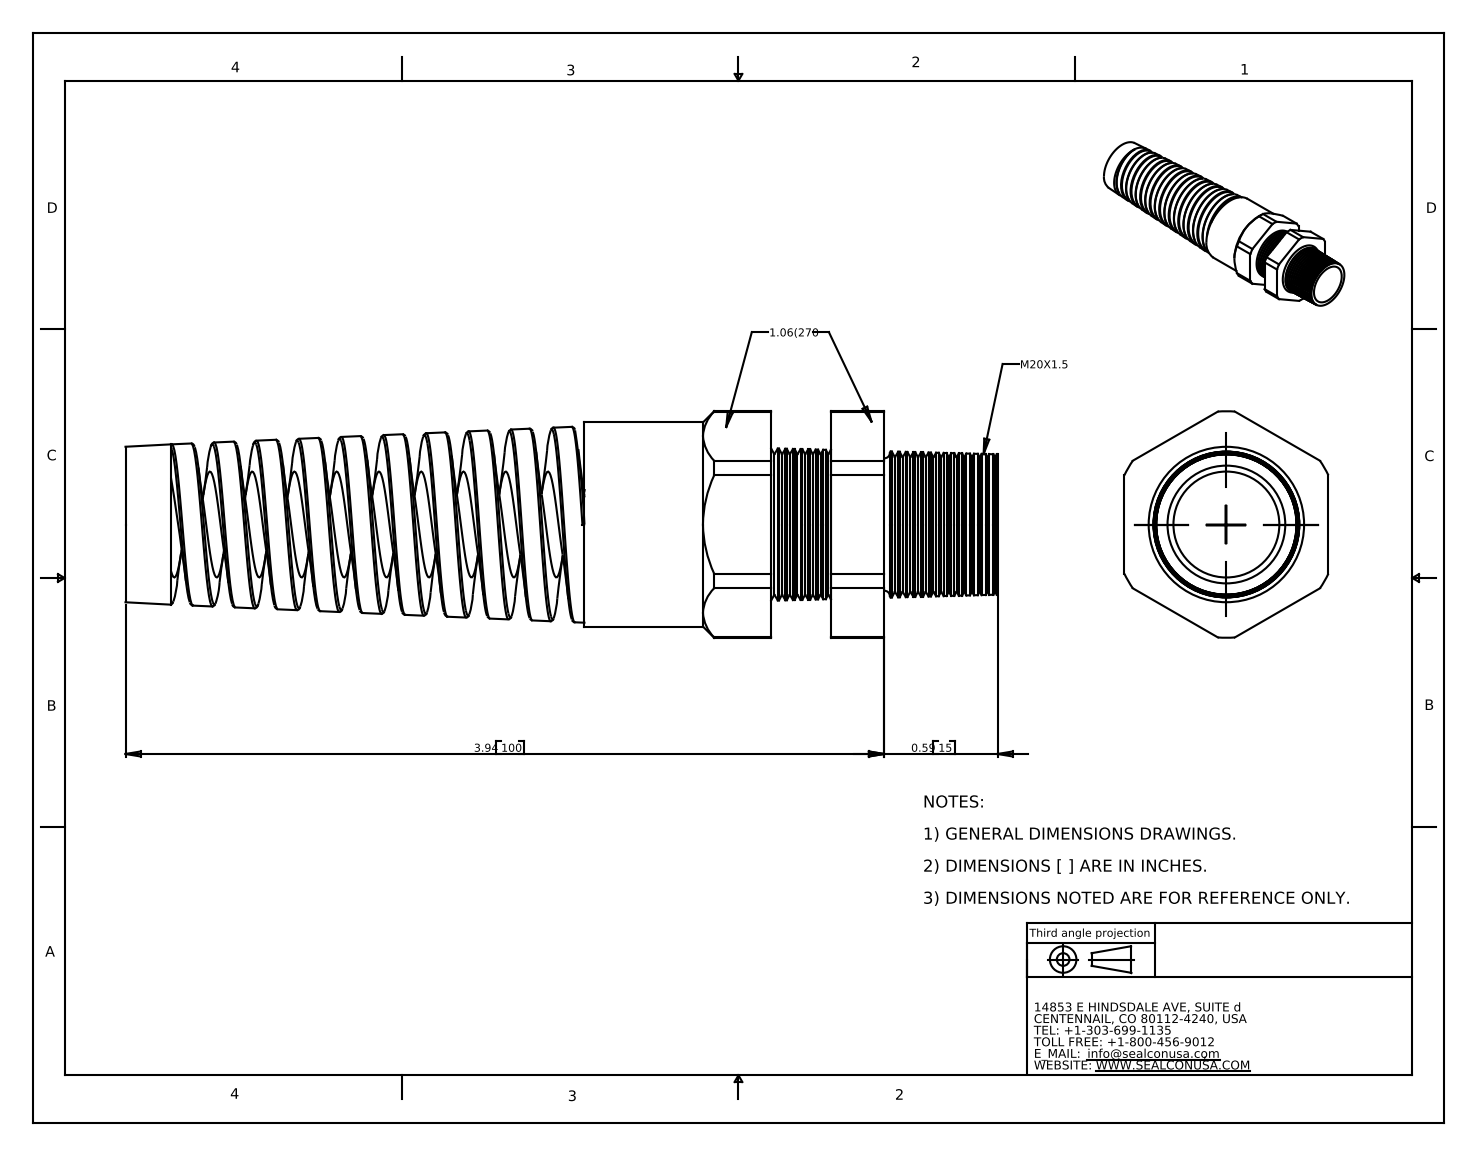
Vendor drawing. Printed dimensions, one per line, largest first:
3.94 100
0.59 15
